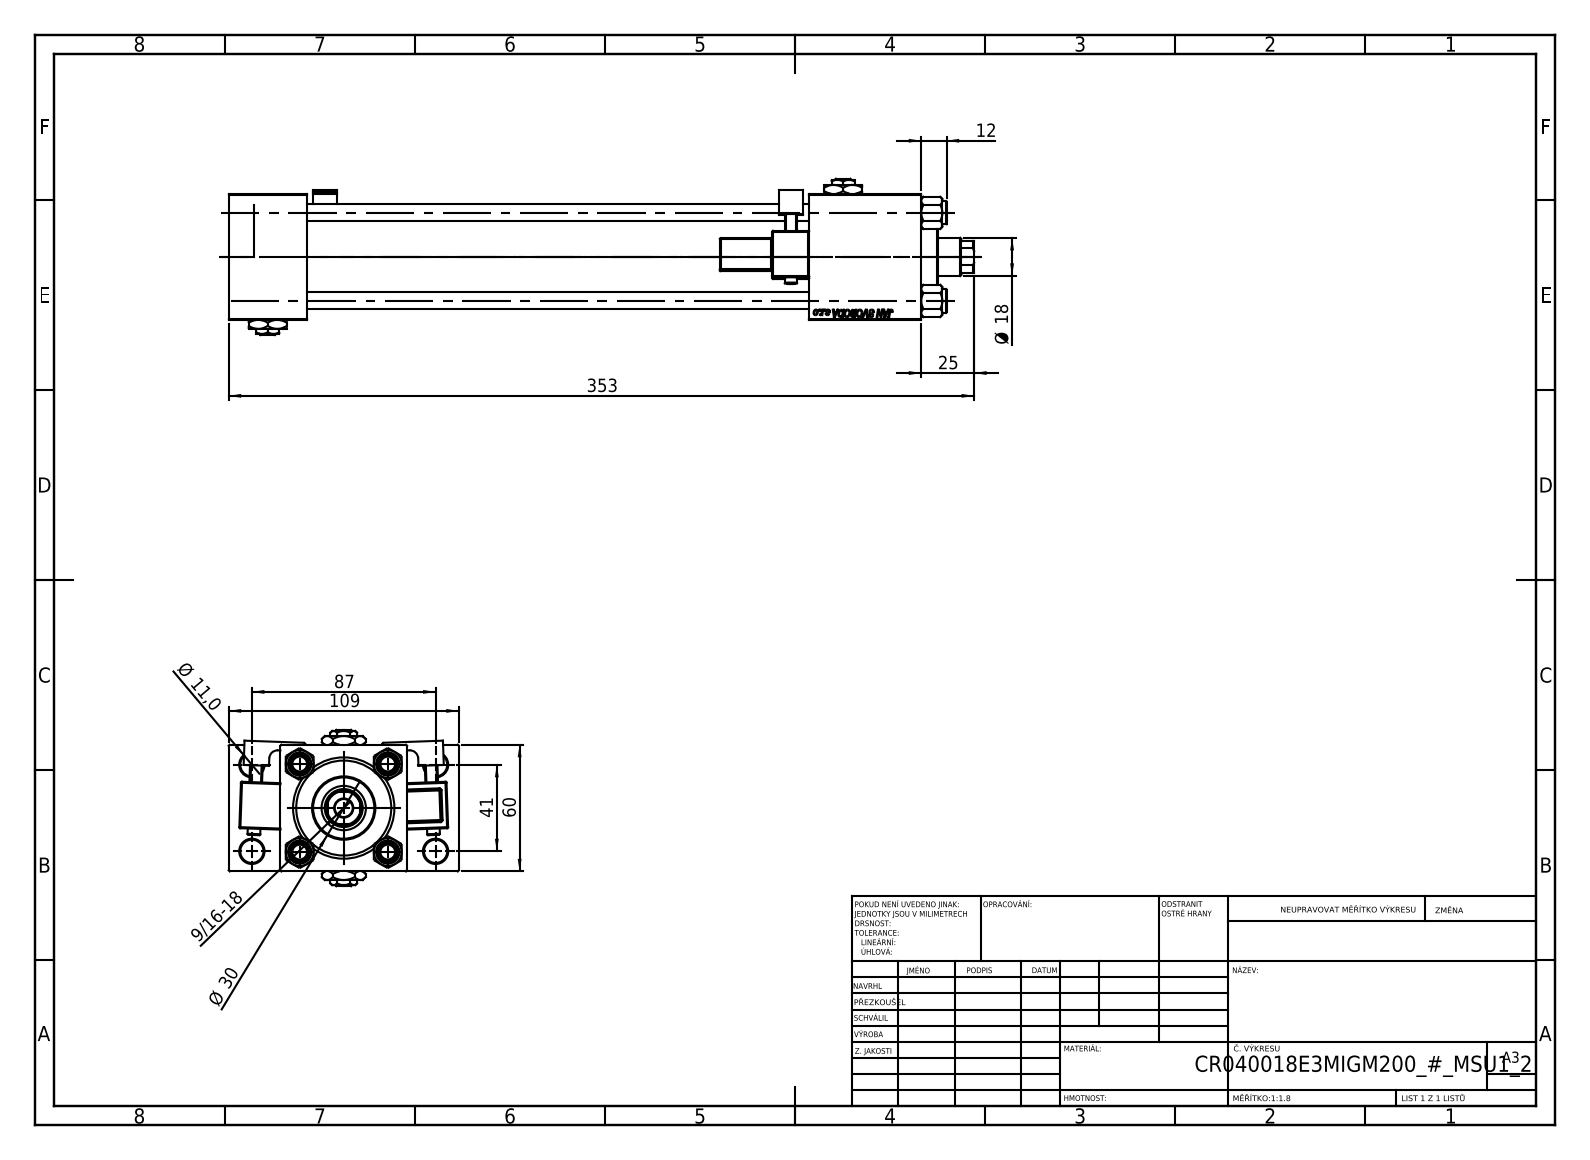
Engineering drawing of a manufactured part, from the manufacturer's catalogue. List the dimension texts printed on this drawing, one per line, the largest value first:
353
109
87
60
41
Ø 30
25
Ø 18
12
Ø 11,0
9/16-18
